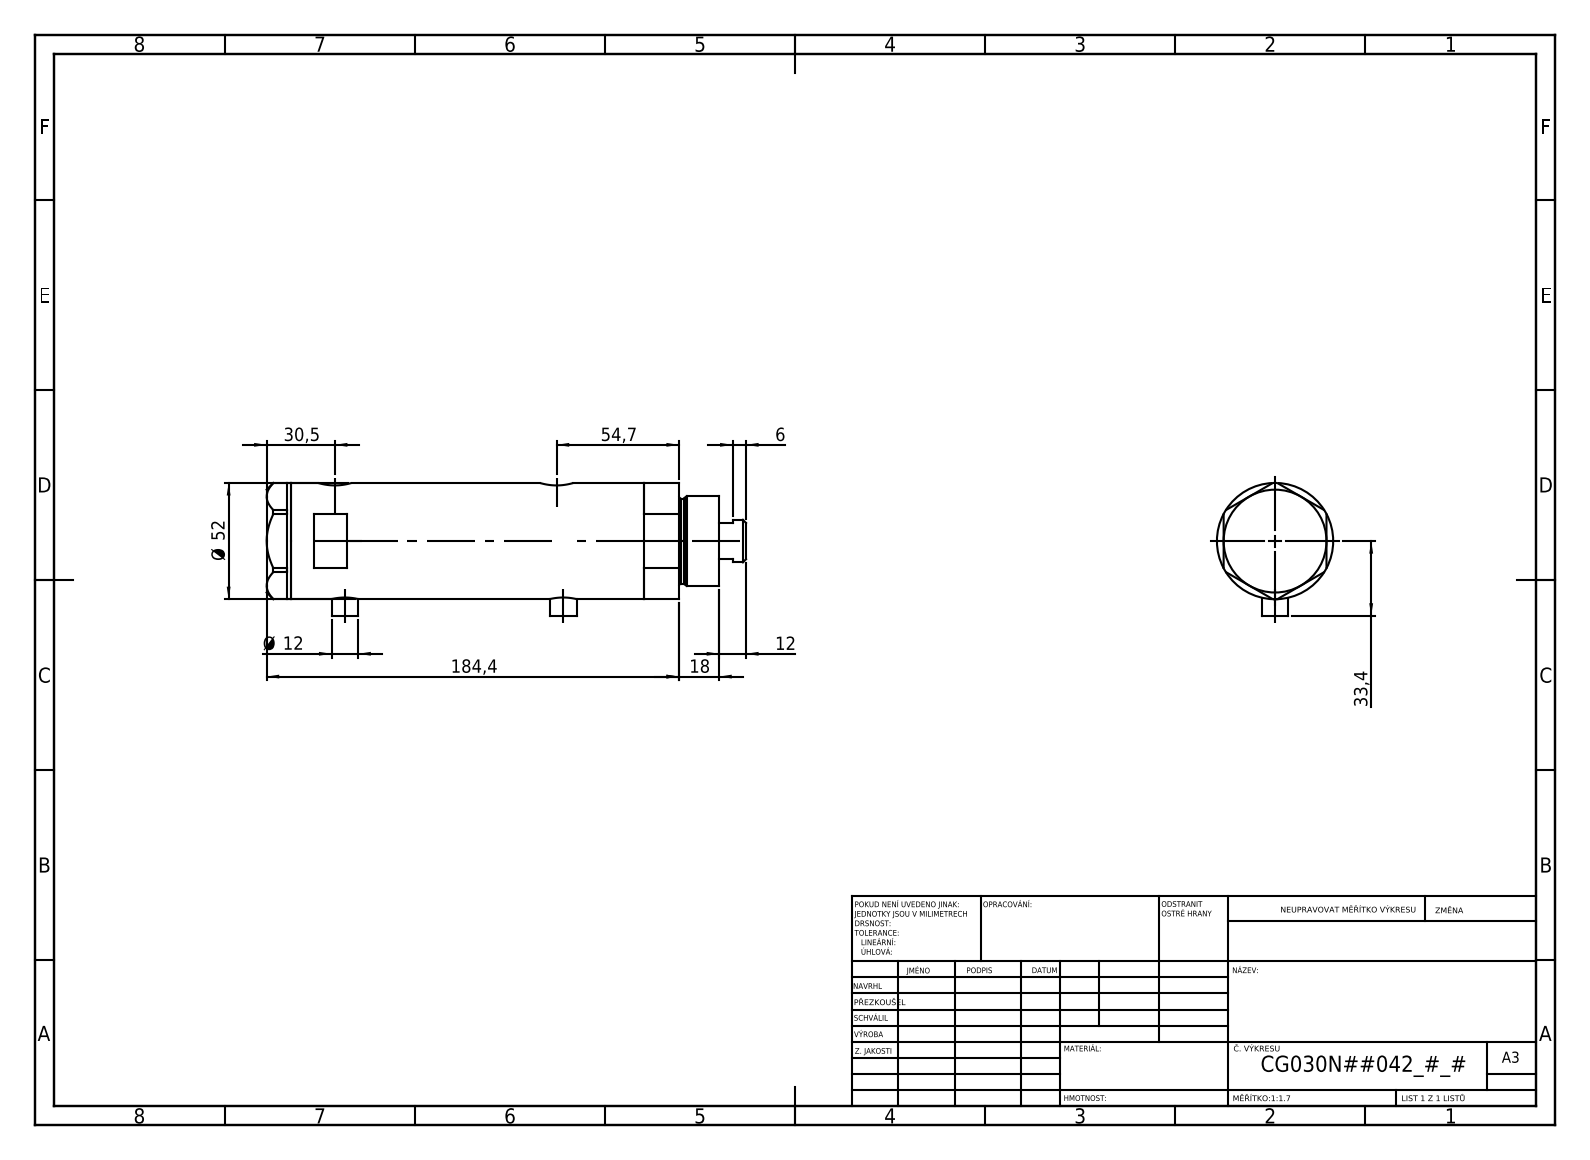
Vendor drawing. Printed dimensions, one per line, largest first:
184,4
54,7
Ø 52
33,4
30,5
18
12
Ø 12
6
